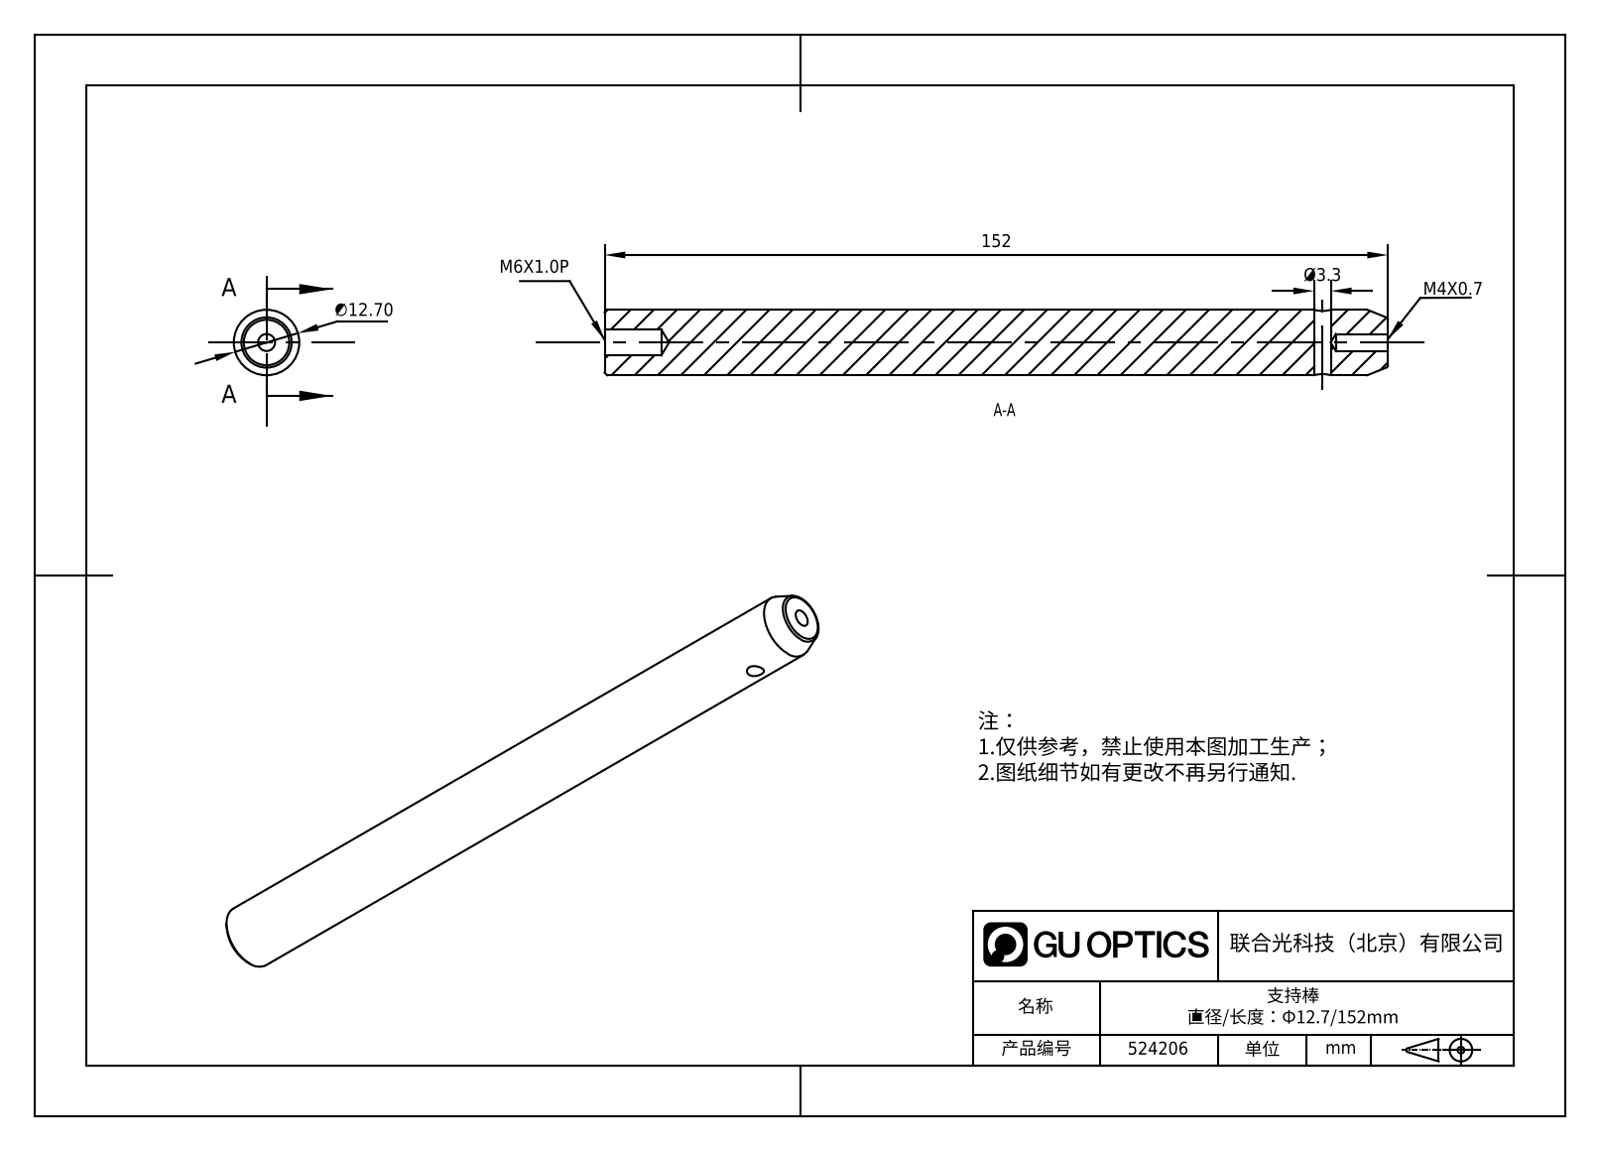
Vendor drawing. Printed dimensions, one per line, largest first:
152
∅12.70
Ø3.3
